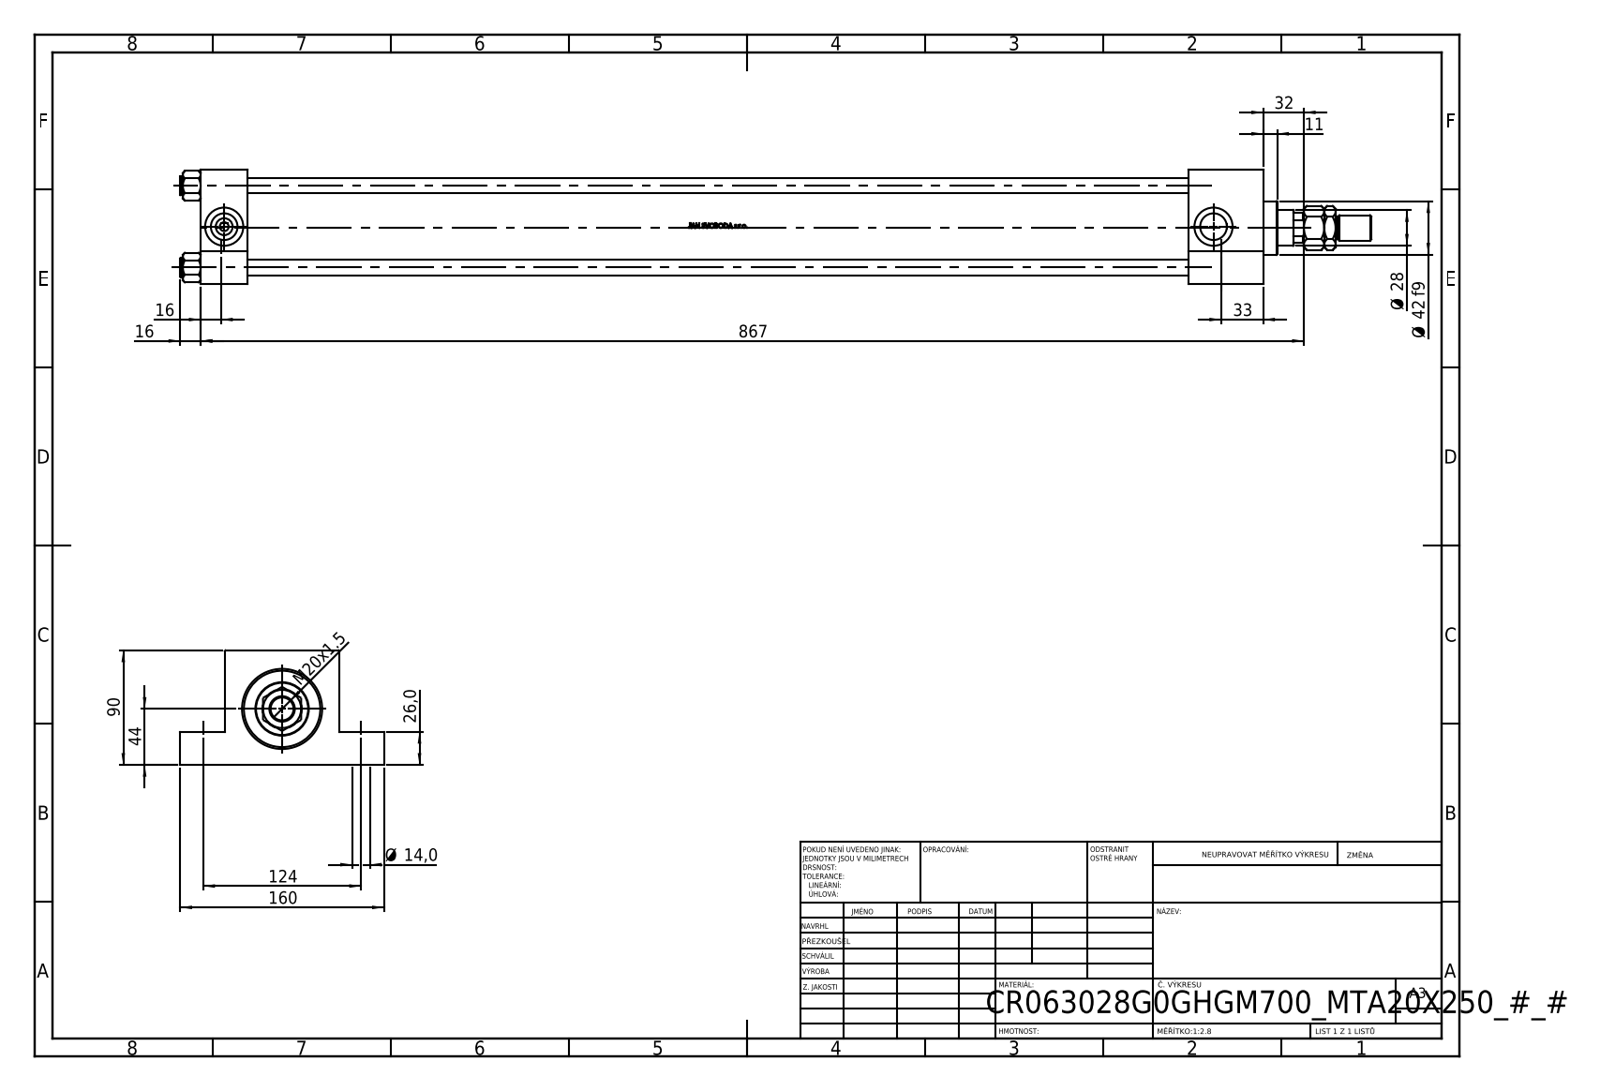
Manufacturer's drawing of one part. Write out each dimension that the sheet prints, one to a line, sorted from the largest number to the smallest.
867
160
124
90
44
Ø 42 f9
33
32
Ø 28
26,0
M20x1.5
16
16
Ø 14,0
11
